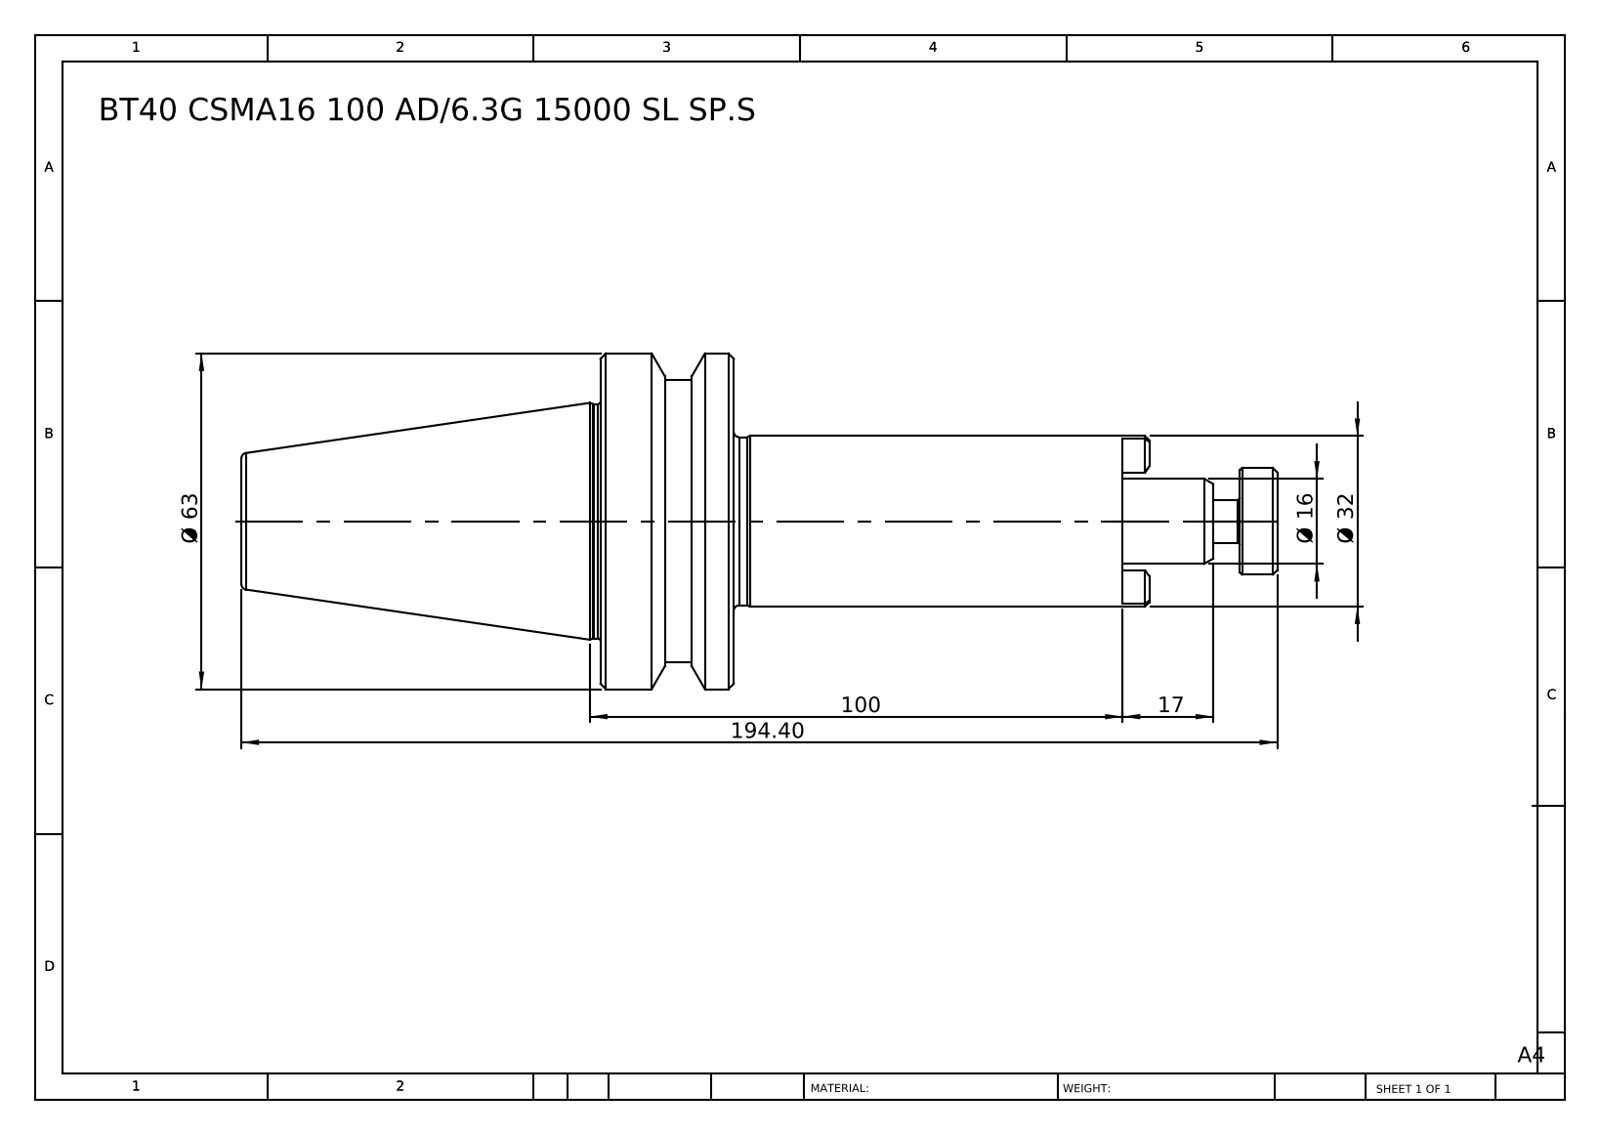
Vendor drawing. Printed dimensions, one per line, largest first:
194.40
100
Ø 63
Ø 32
17
Ø 16
